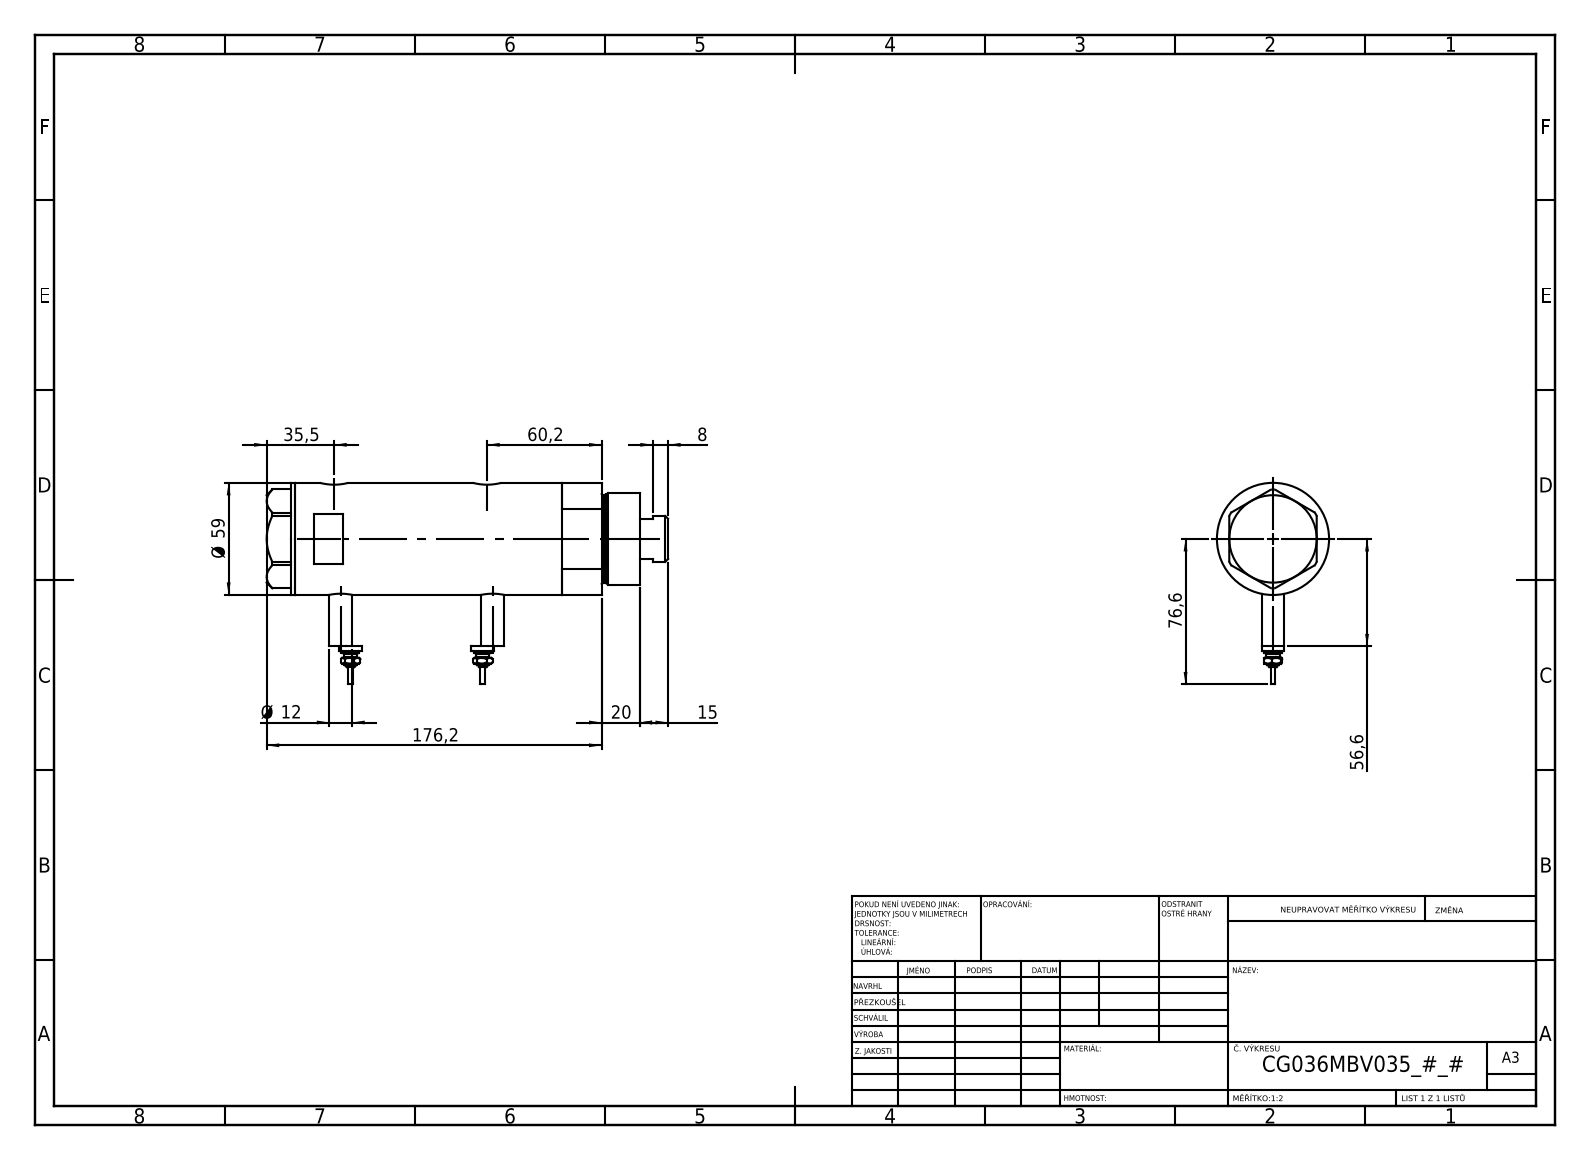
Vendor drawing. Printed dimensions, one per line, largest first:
176,2
76,6
60,2
Ø 59
56,6
35,5
20
15
Ø 12
8
